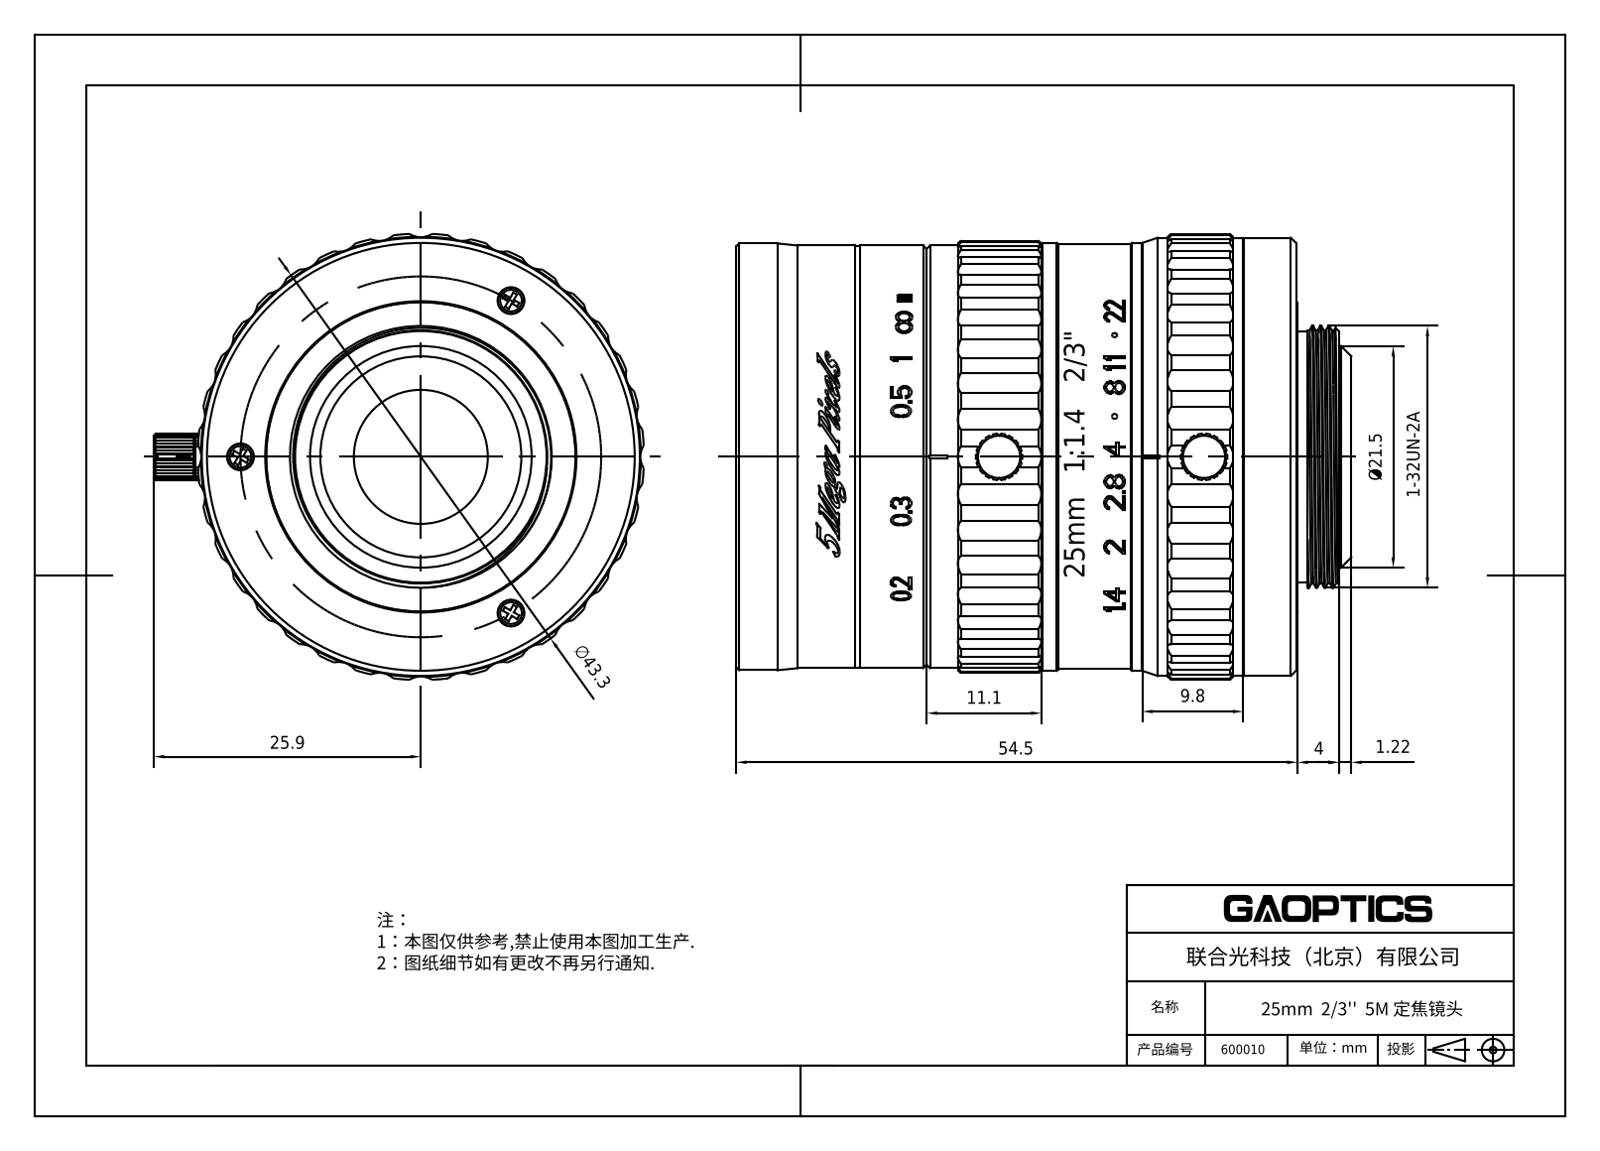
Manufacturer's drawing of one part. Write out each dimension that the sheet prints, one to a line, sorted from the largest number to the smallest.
54.5
∅43.3
25.9
Ø21.5
11.1
9.8
4
1.22
1-32UN-2A
